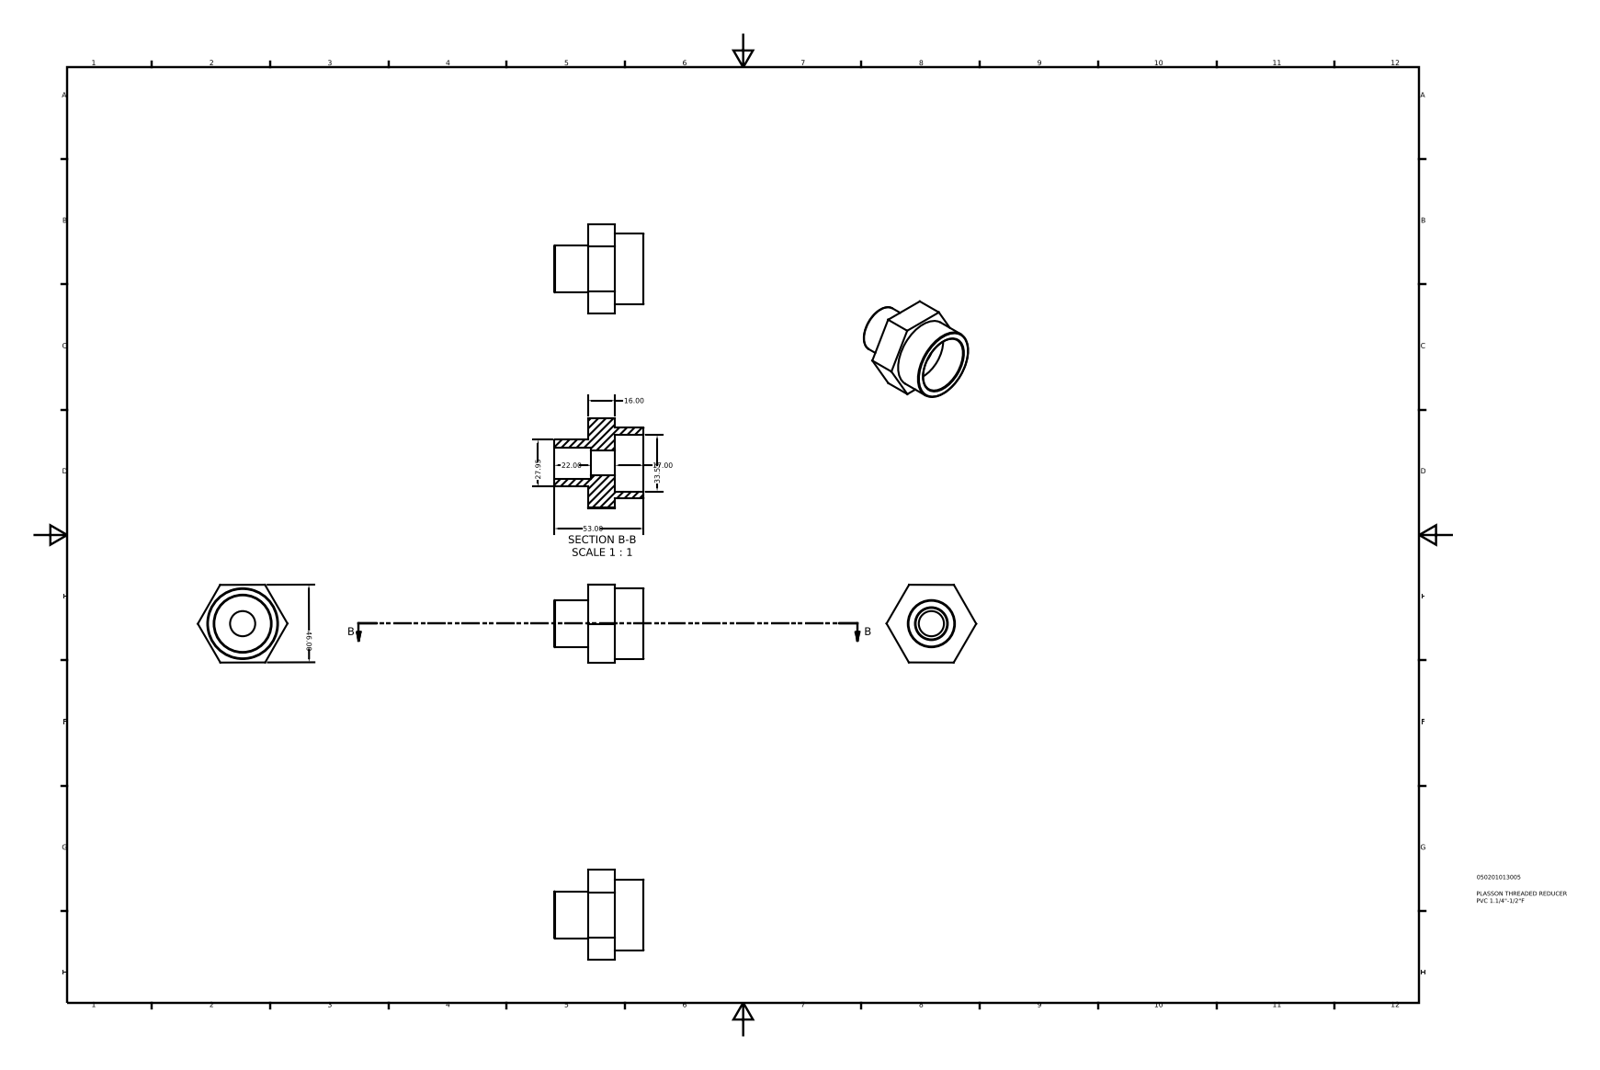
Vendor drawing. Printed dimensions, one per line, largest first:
53.00
46.00
33.53
27.95
22.00
17.00
16.00
